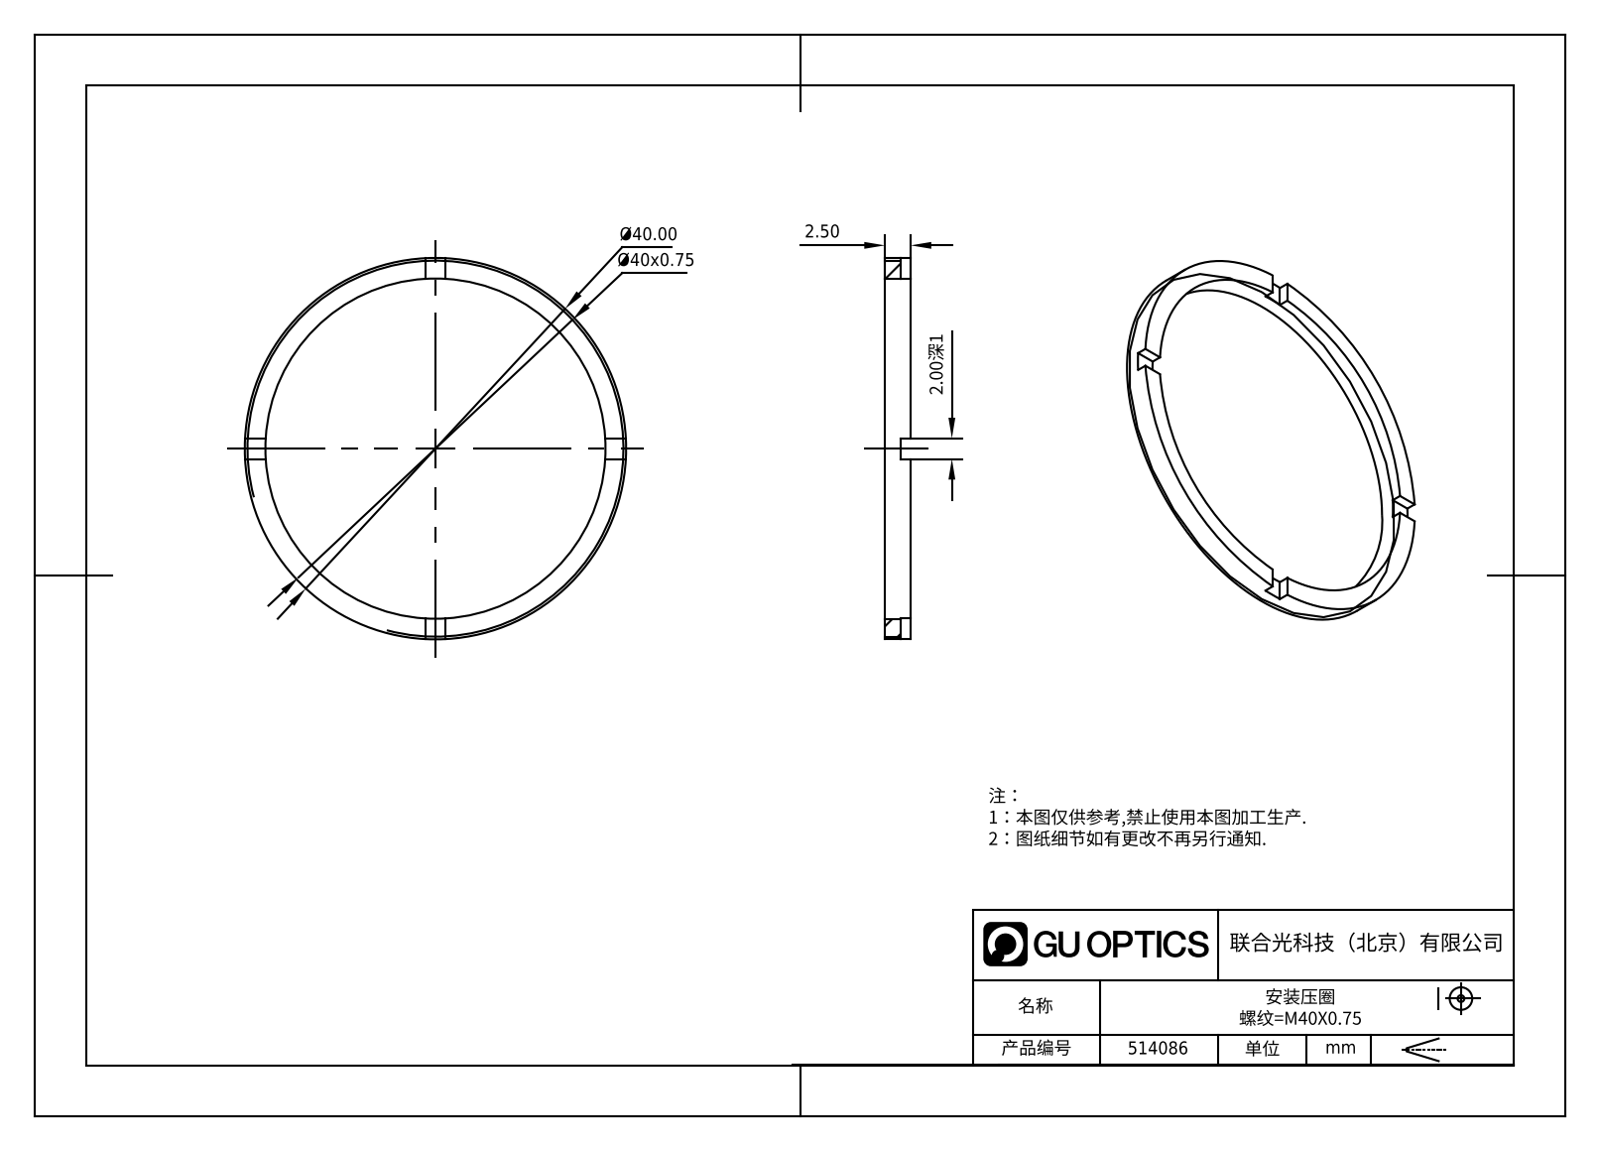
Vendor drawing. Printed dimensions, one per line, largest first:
Ø40.00
Ø40x0.75
2.50
2.00深1
